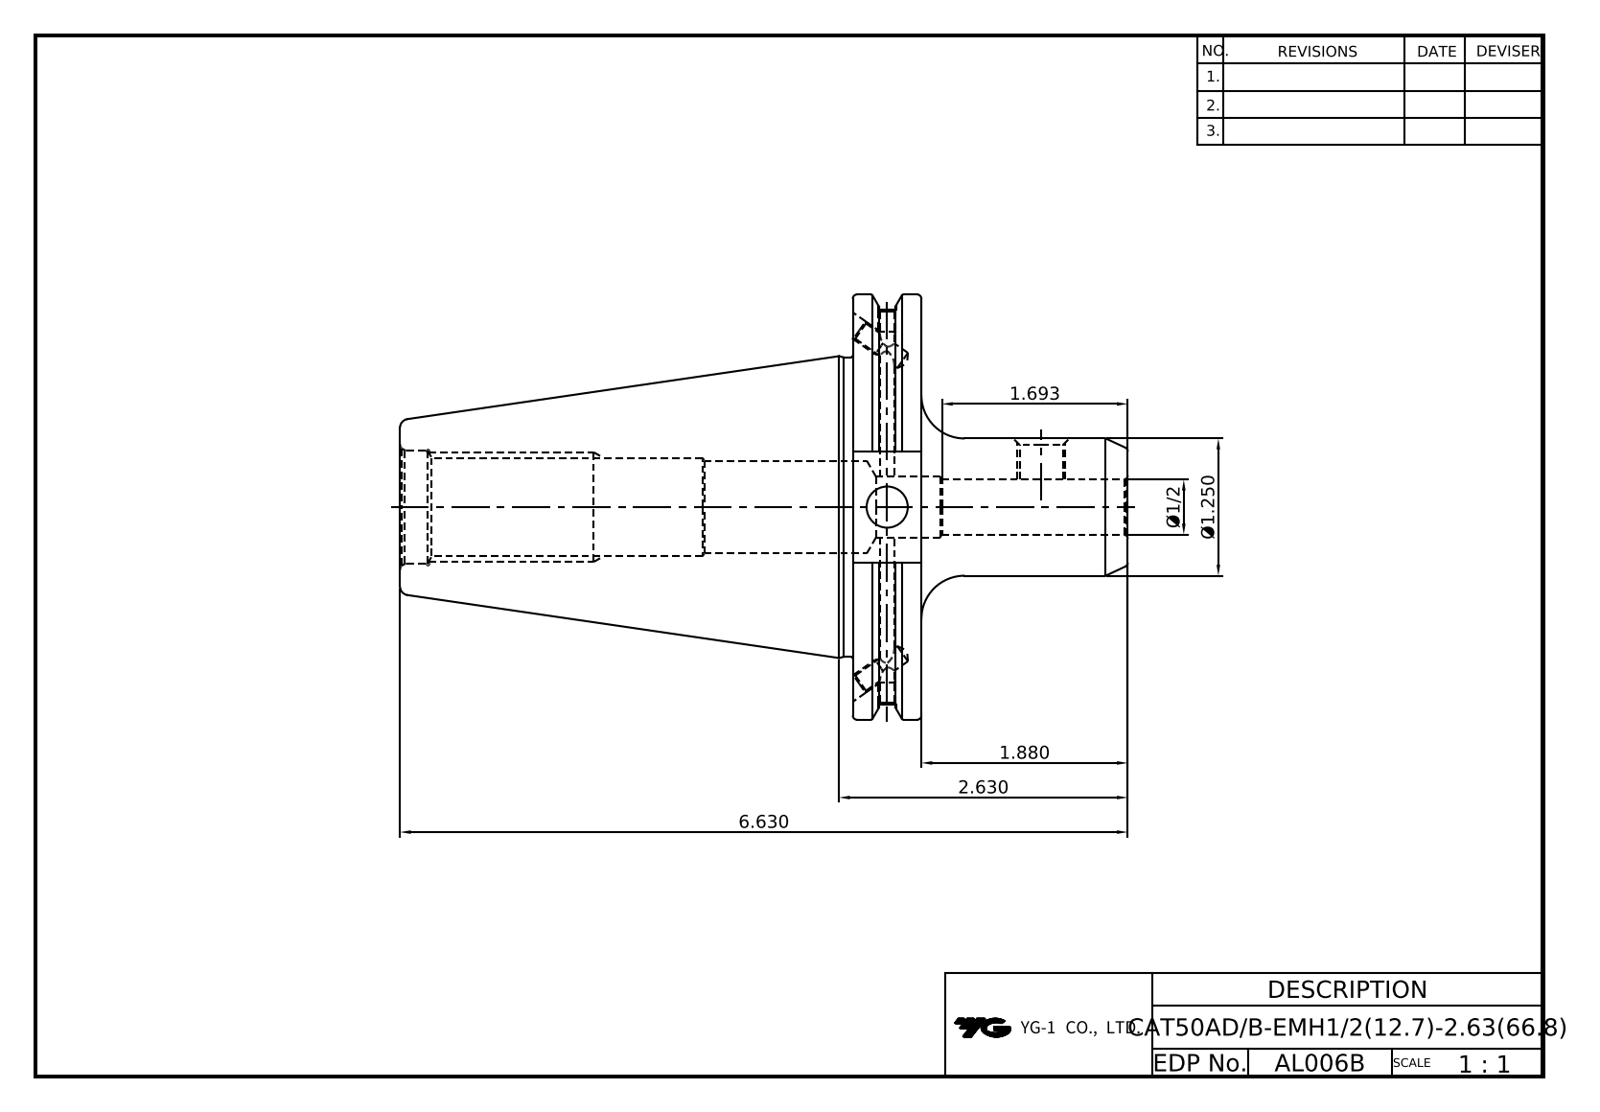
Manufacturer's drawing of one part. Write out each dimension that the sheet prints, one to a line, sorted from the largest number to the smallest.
6.630
2.630
1.880
1.693
Ø1.250
Ø1/2
